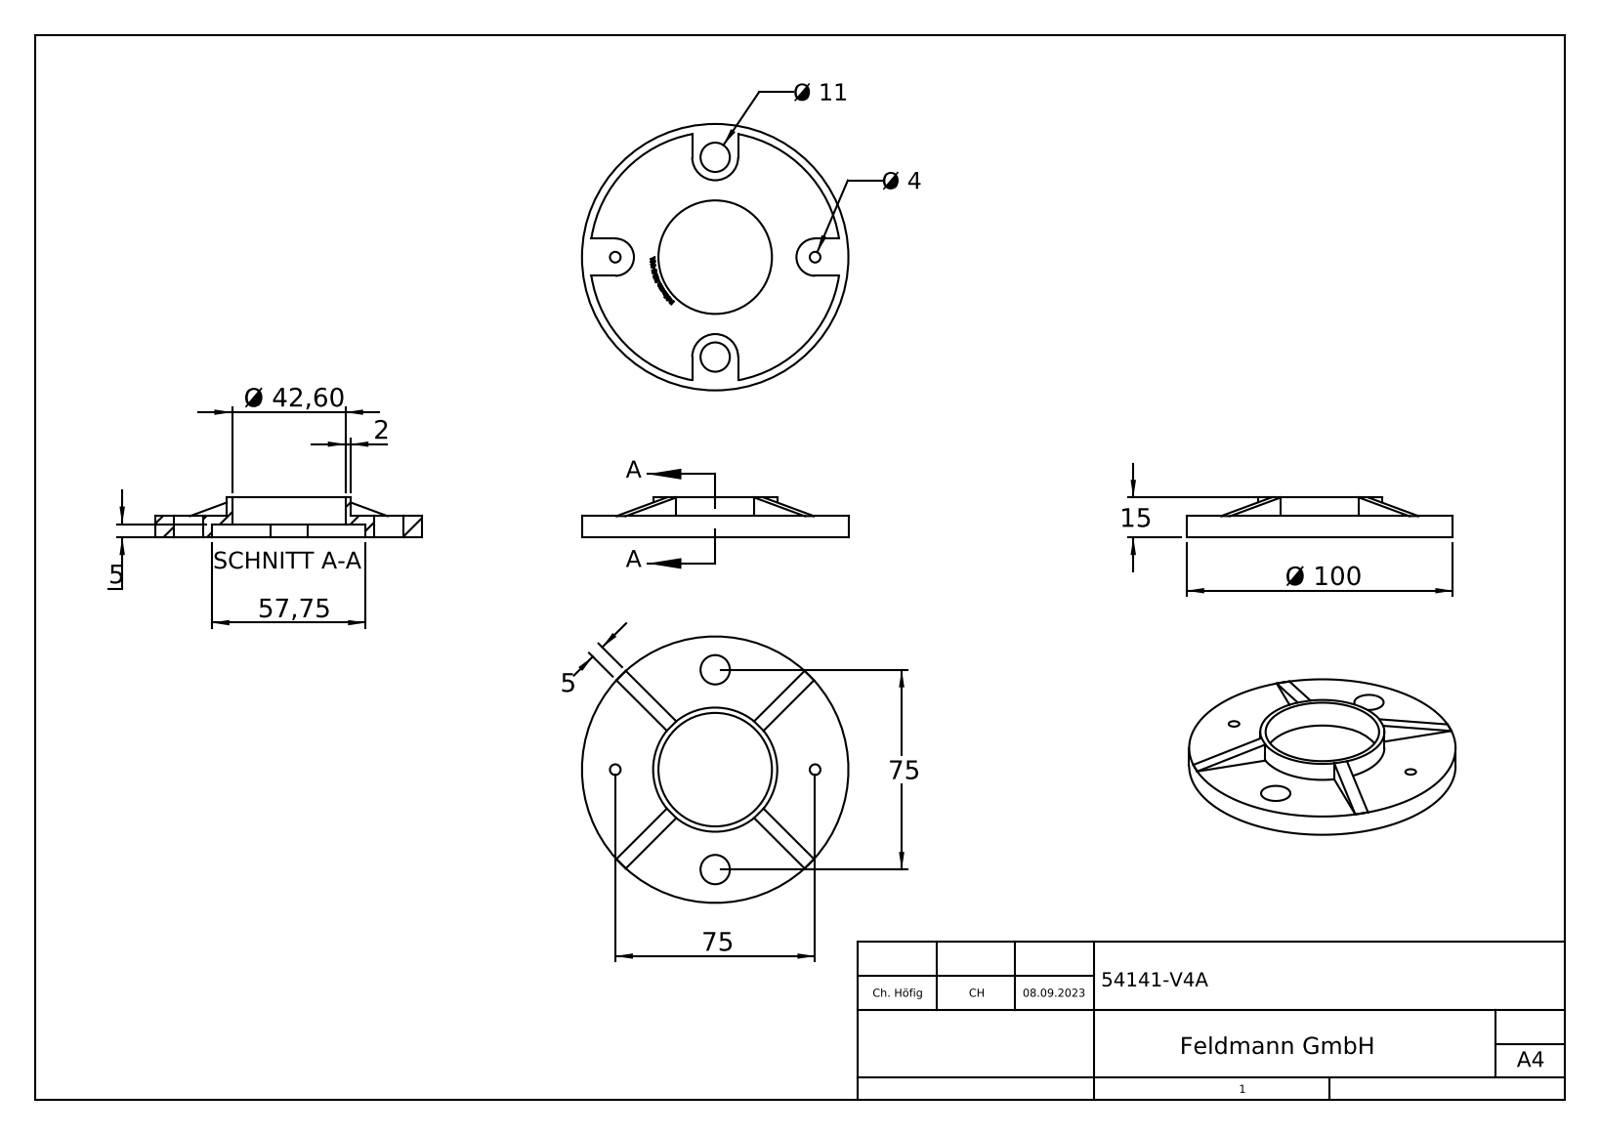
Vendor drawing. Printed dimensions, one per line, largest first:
Ø 100
75
75
57,75
Ø 42,60
15
Ø 11
5
5
Ø 4
2
